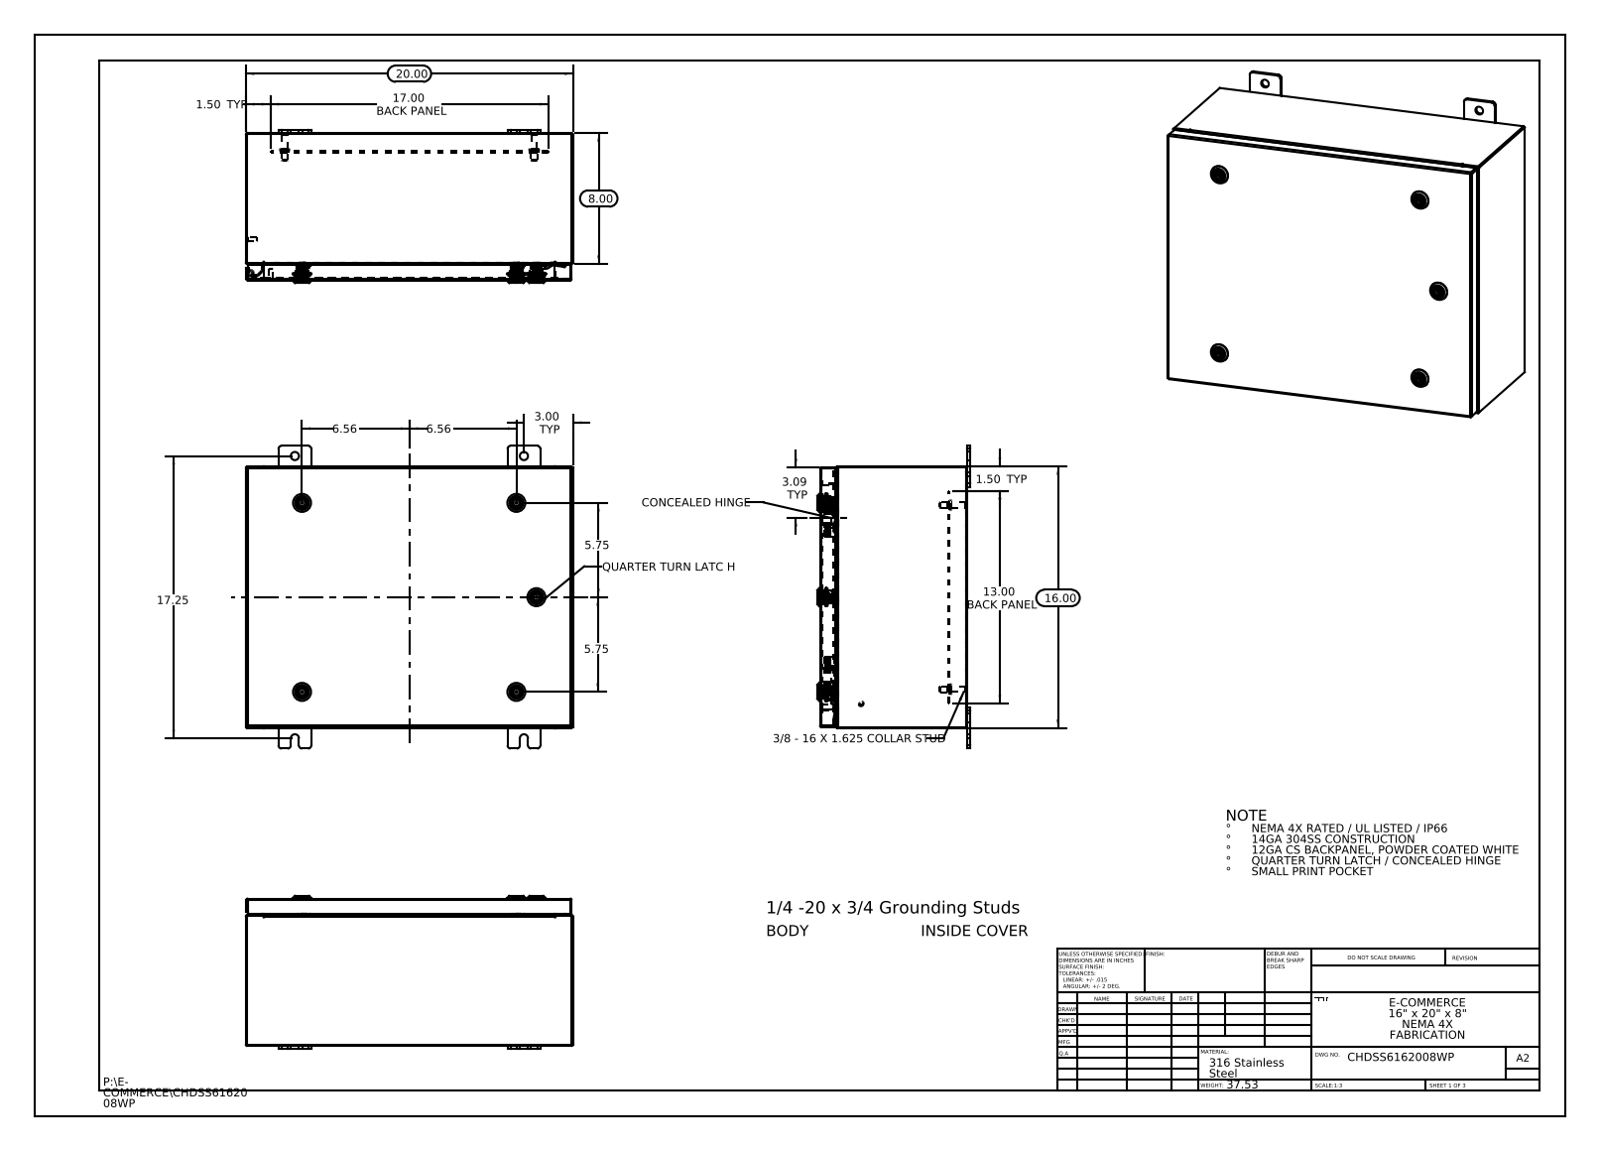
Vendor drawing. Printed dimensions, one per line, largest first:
20.00
17.25
17.00 BACK PANEL
16.00
13.00 BACK PANEL
8.00
6.56
6.56
5.75
5.75
3.09 TYP
3.00 TYP
1.50 TYP
1.50 TYP
